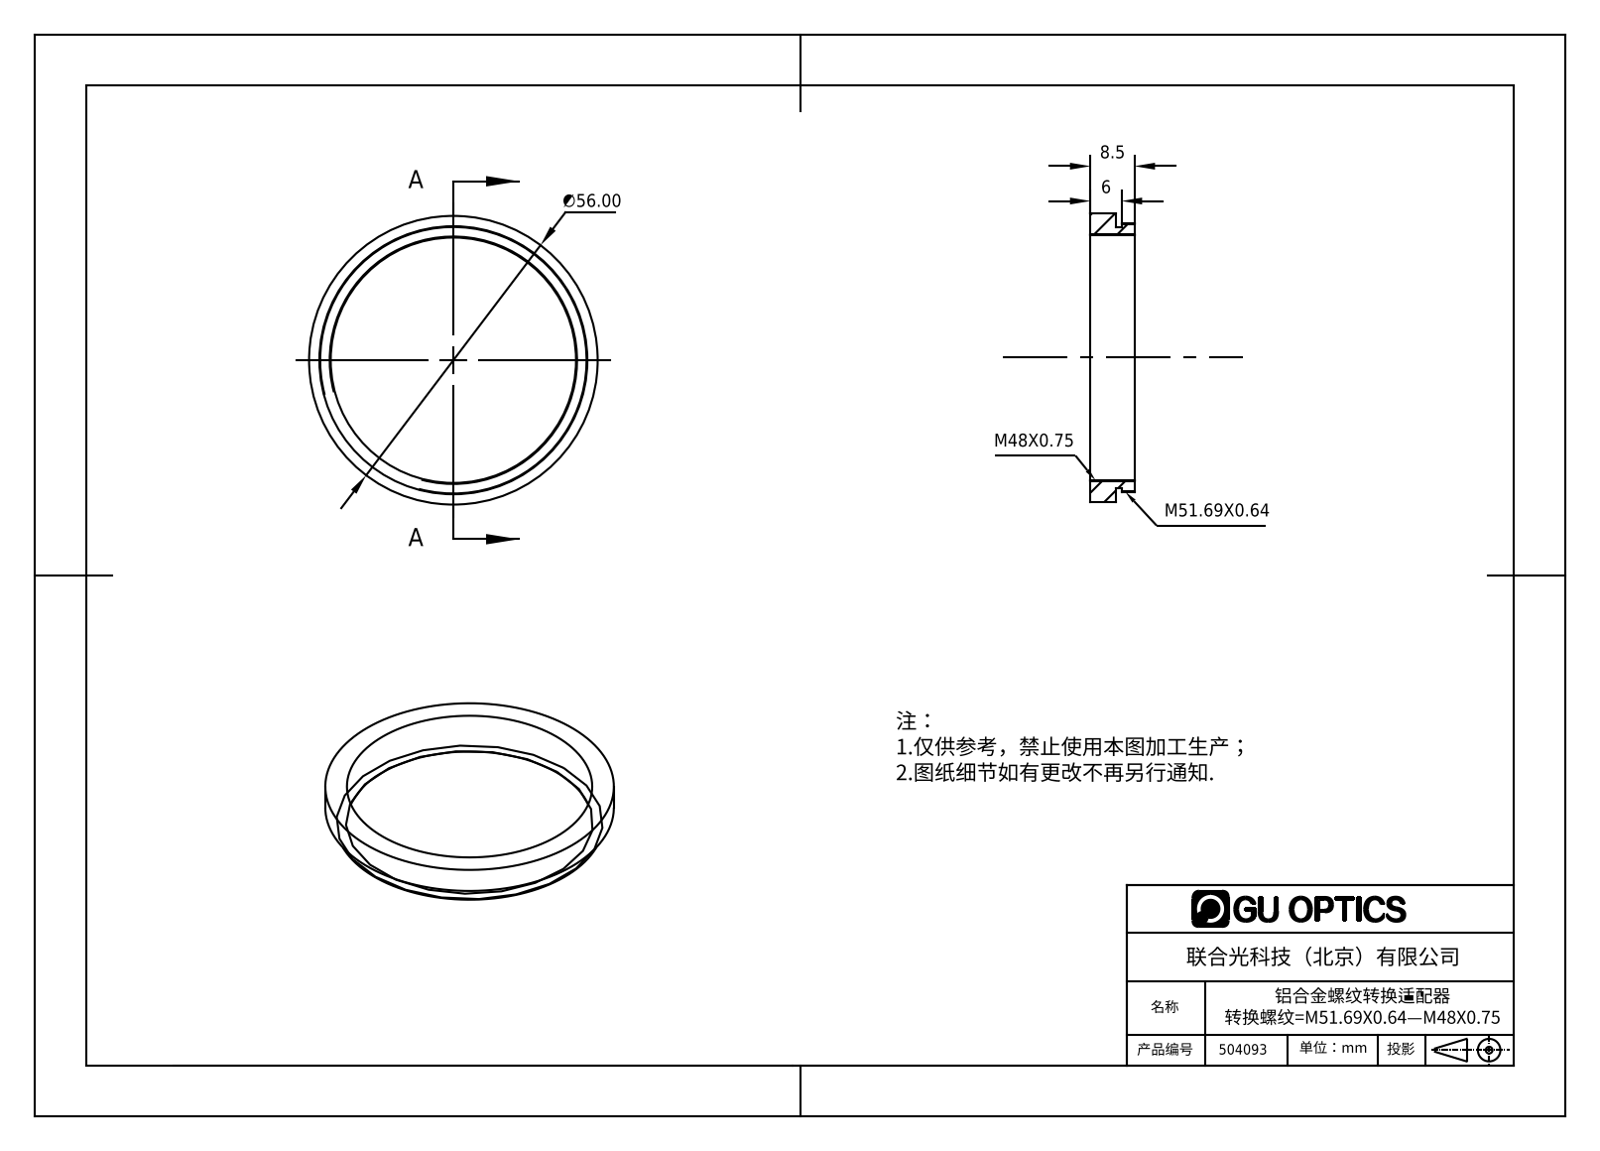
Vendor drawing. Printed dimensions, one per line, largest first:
∅56.00
8.5
6
